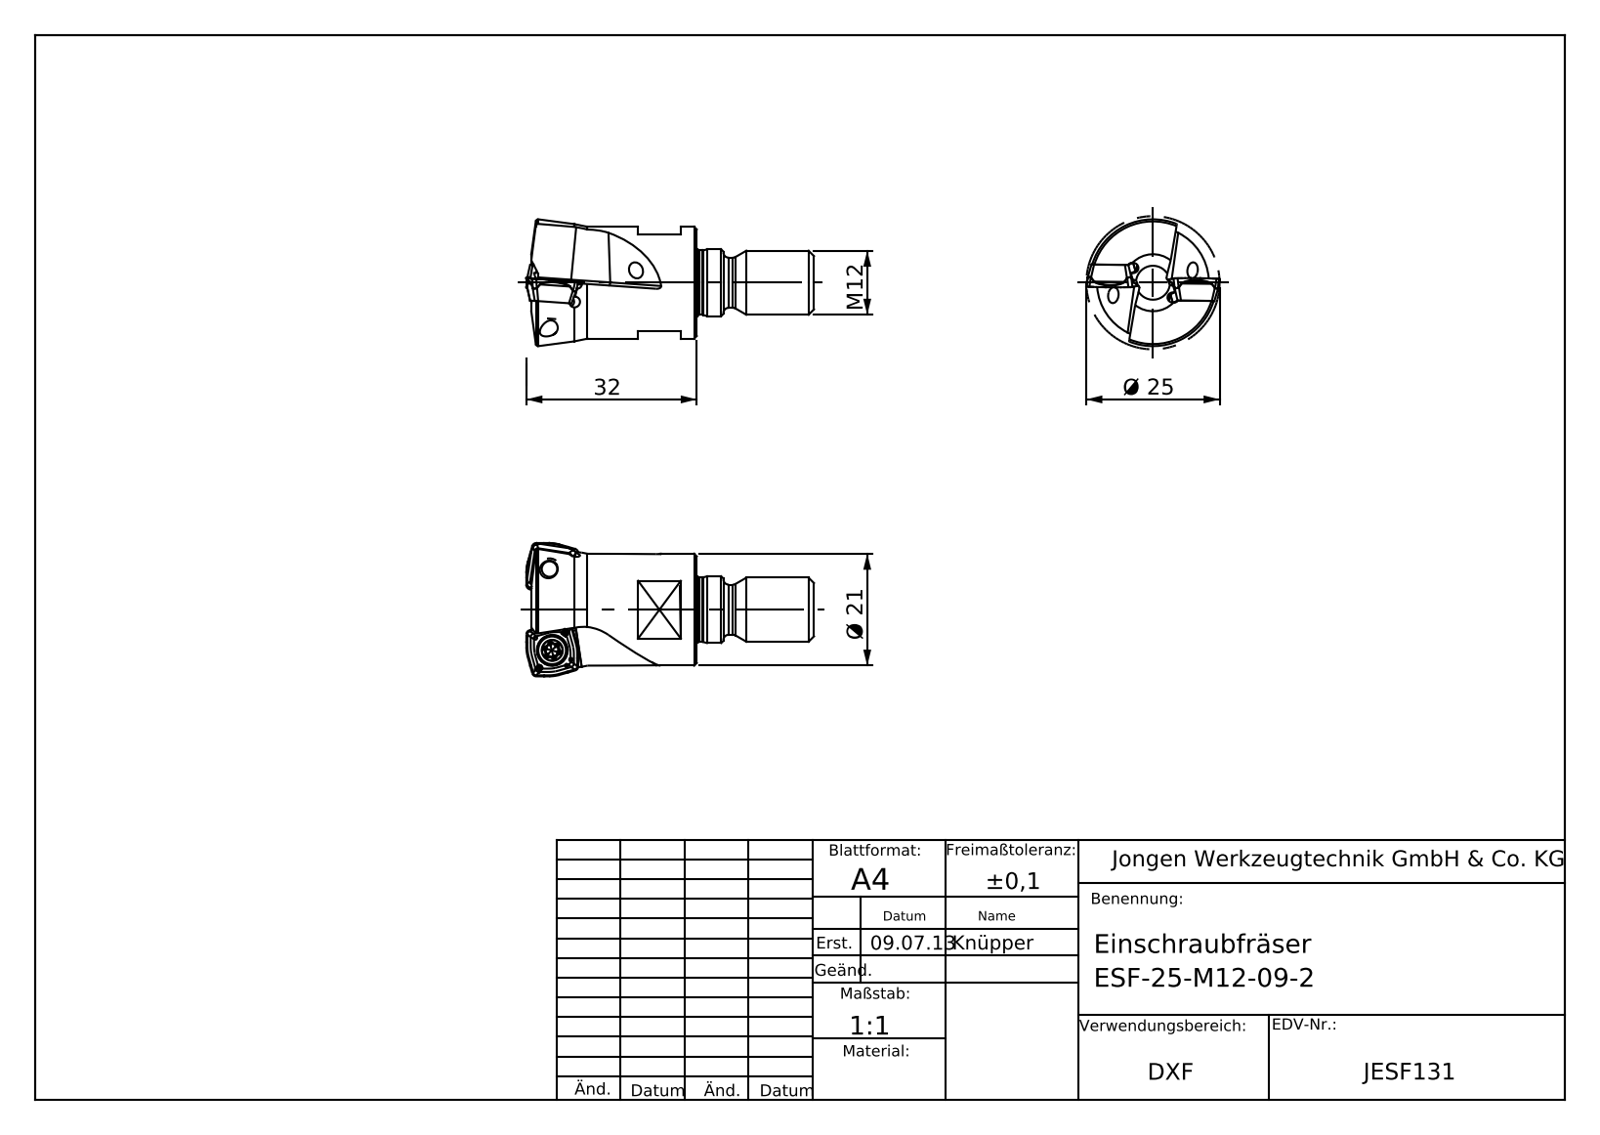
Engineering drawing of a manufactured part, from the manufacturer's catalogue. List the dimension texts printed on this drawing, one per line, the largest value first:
32
Ø 25
Ø 21
M 12
